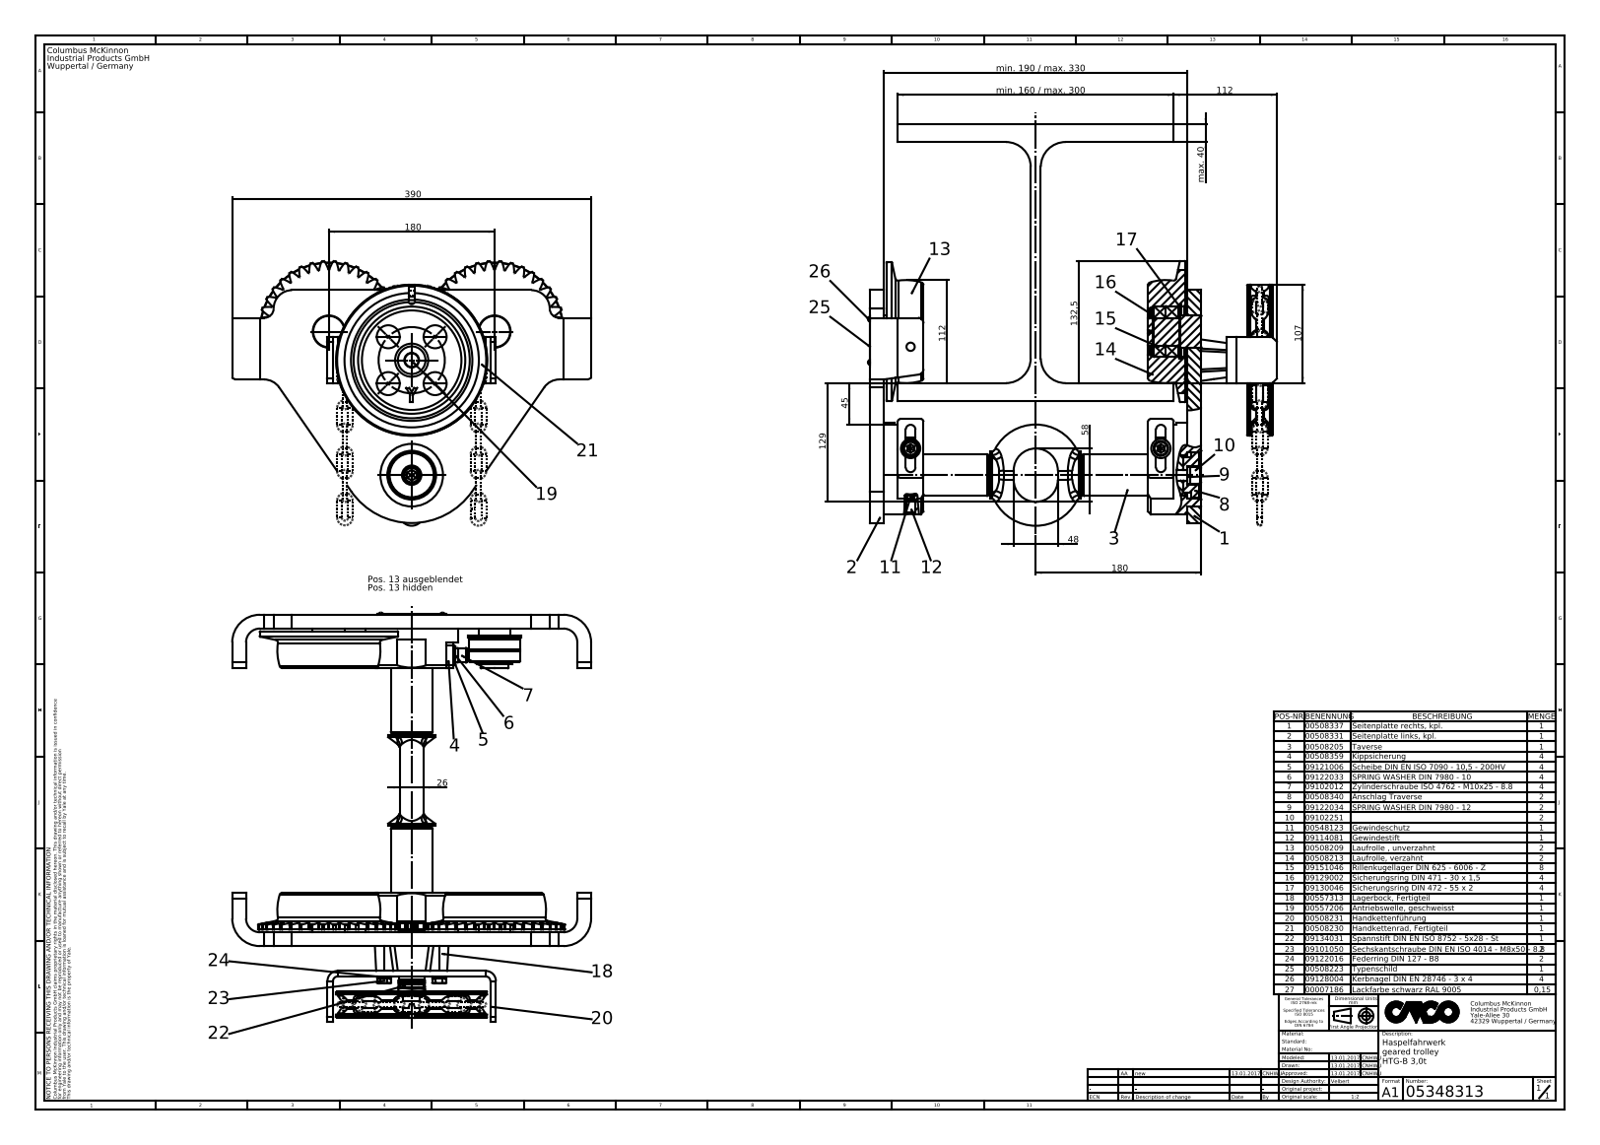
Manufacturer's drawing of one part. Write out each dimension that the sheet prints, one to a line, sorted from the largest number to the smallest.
390
min. 190 / max. 330
180
180
min. 160 / max. 300
132,5
129
112
112
107
58
48
45
max. 40
26
